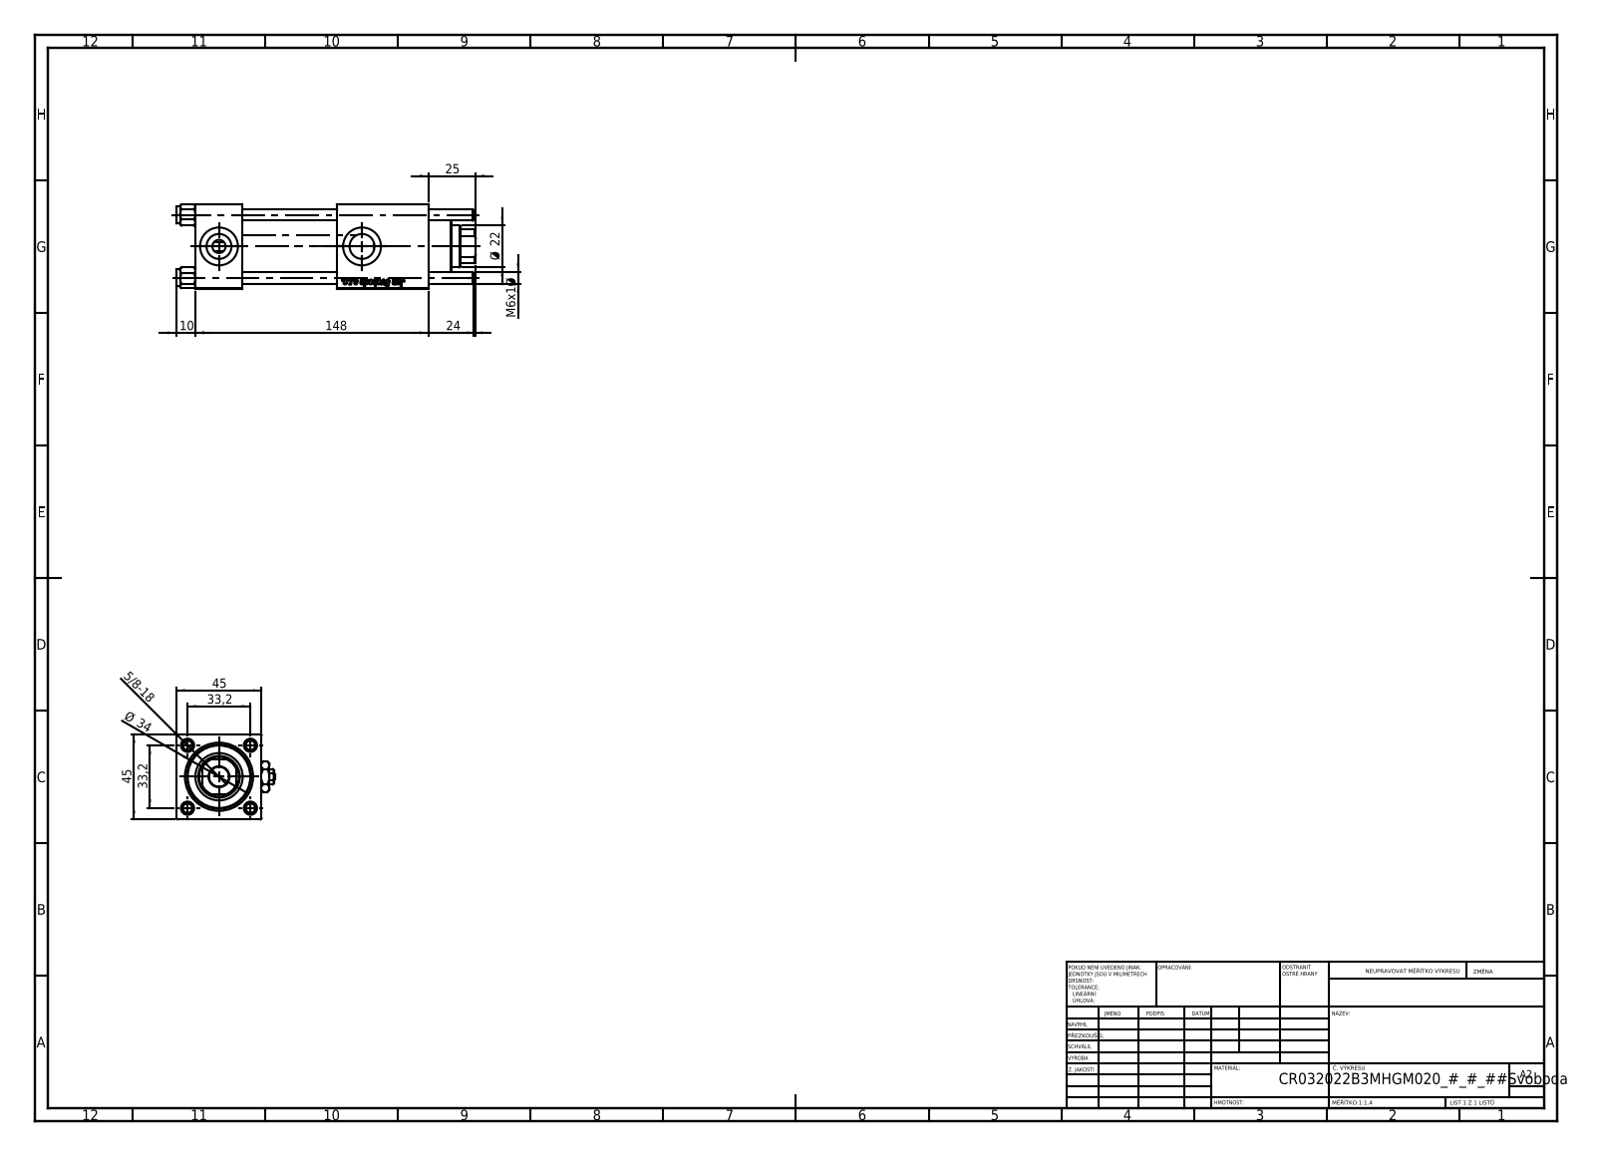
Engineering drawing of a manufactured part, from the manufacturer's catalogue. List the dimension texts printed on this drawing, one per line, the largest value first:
148
45
45
Ø 34
33,2
33,2
25
24
Ø 22
10
M6x1 Ø
5/8-18
